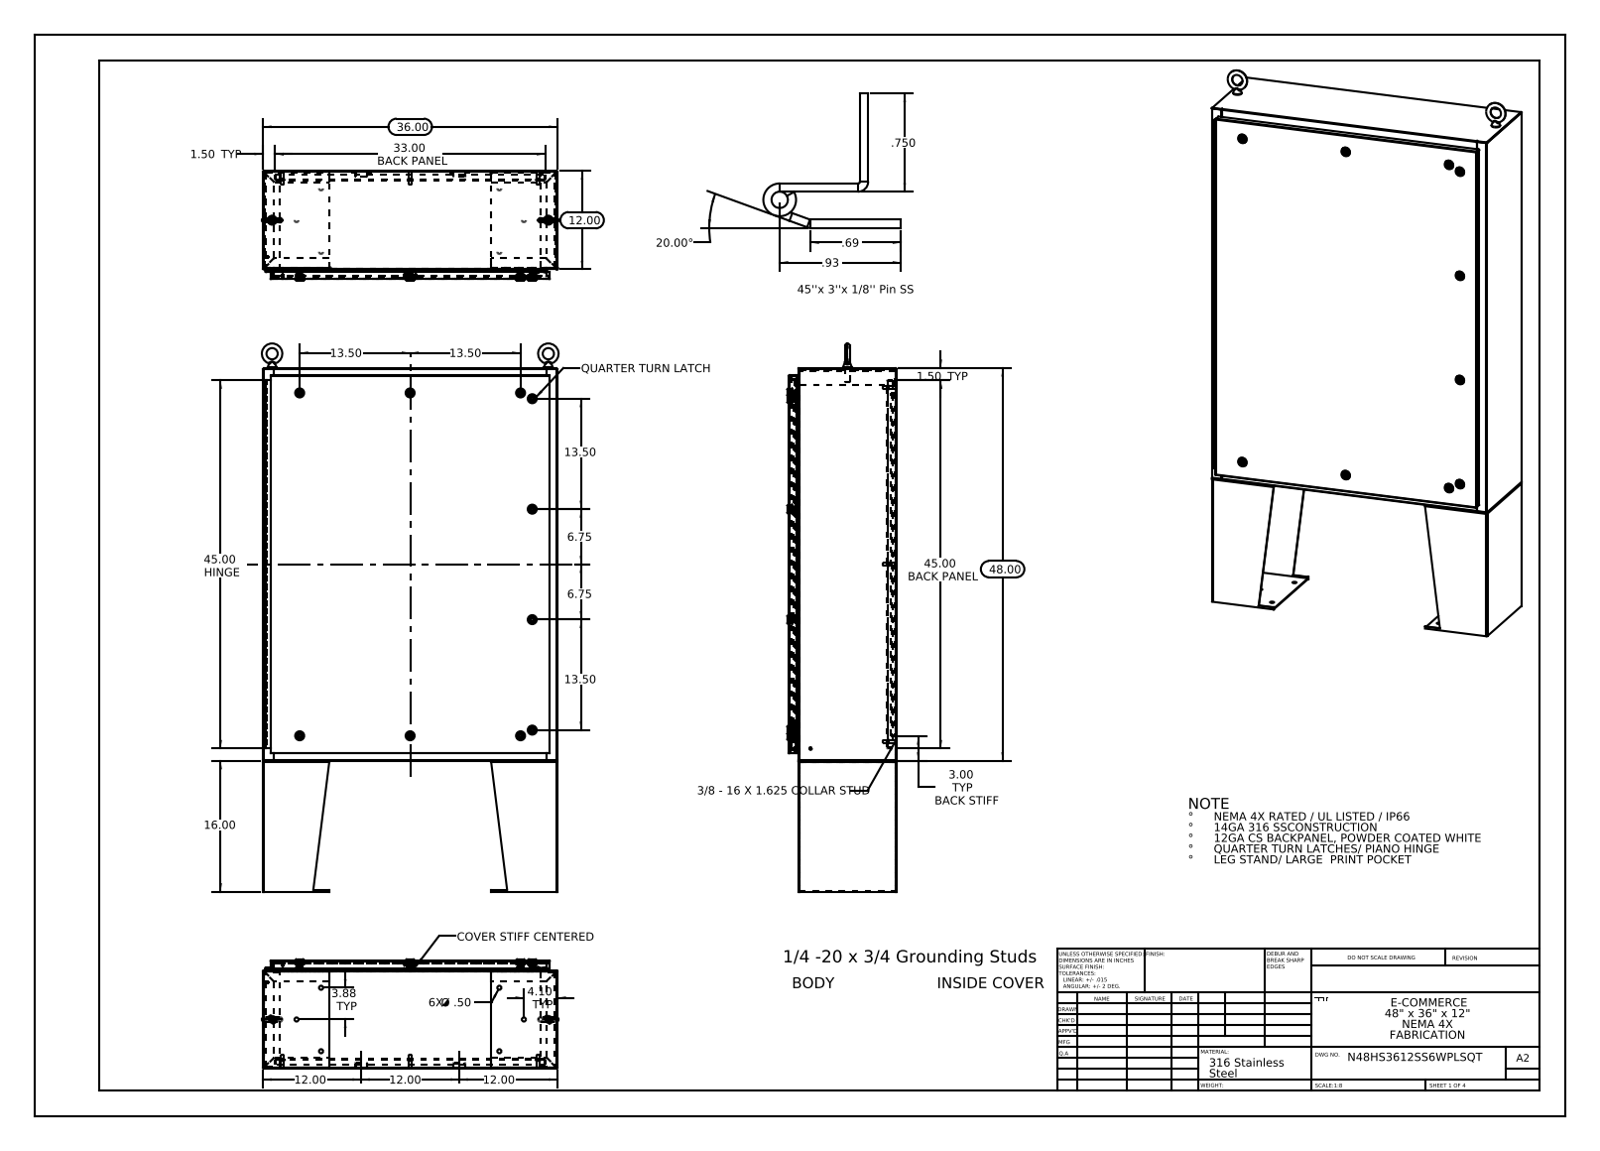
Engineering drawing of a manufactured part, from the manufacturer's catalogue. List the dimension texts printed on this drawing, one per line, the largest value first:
48.00
45.00 HINGE
45.00 BACK PANEL
36.00
33.00 BACK PANEL
20.00°
16.00
13.50
13.50
13.50
13.50
12.00
12.00
12.00
12.00
6.75
6.75
4.10 TYP
3.88 TYP
3.00 TYP BACK STIFF
1.50 TYP
1.50 TYP
.93
.750
.69
6X Ø .50
